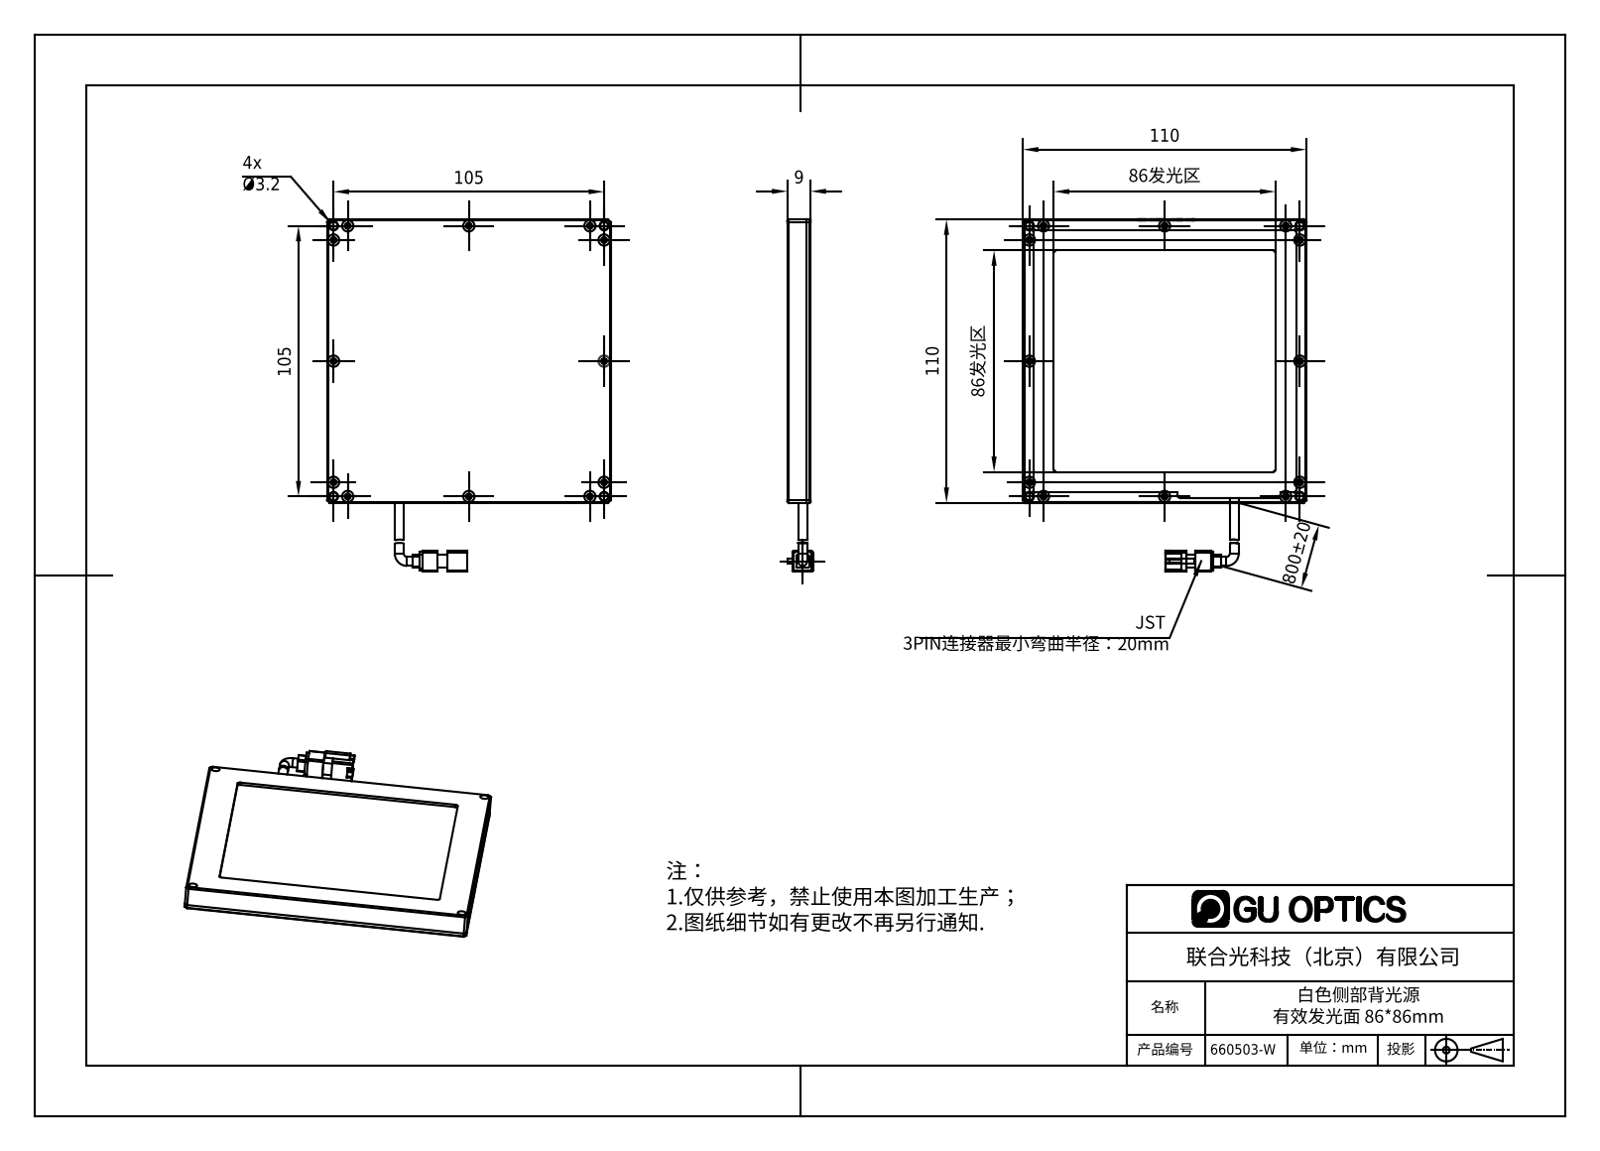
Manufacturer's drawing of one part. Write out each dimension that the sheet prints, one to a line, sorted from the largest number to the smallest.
800±20
110
110
105
105
86发光区
86发光区
9
